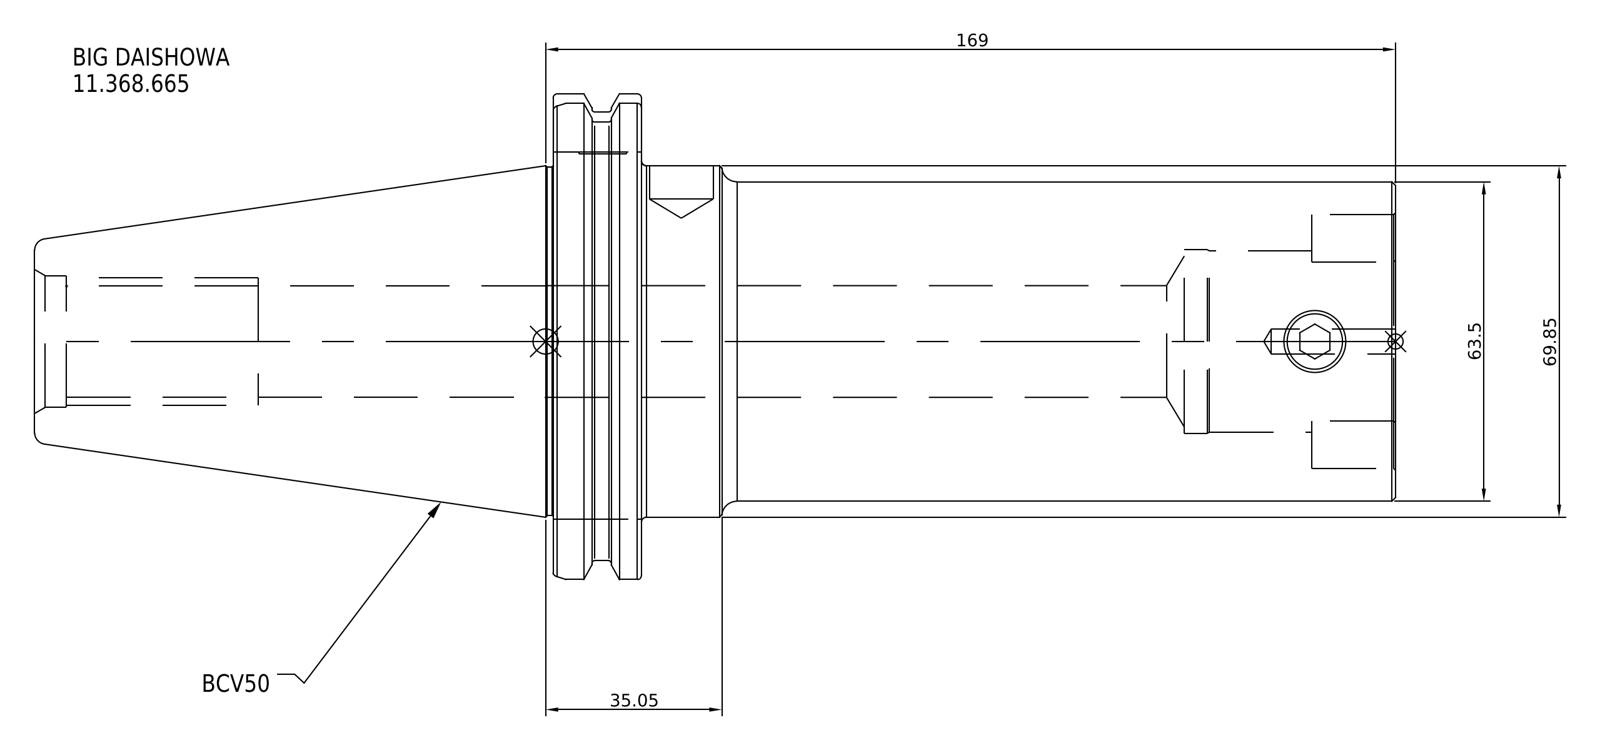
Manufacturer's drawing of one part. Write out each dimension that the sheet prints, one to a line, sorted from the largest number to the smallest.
169
69.85
63.5
35.05
